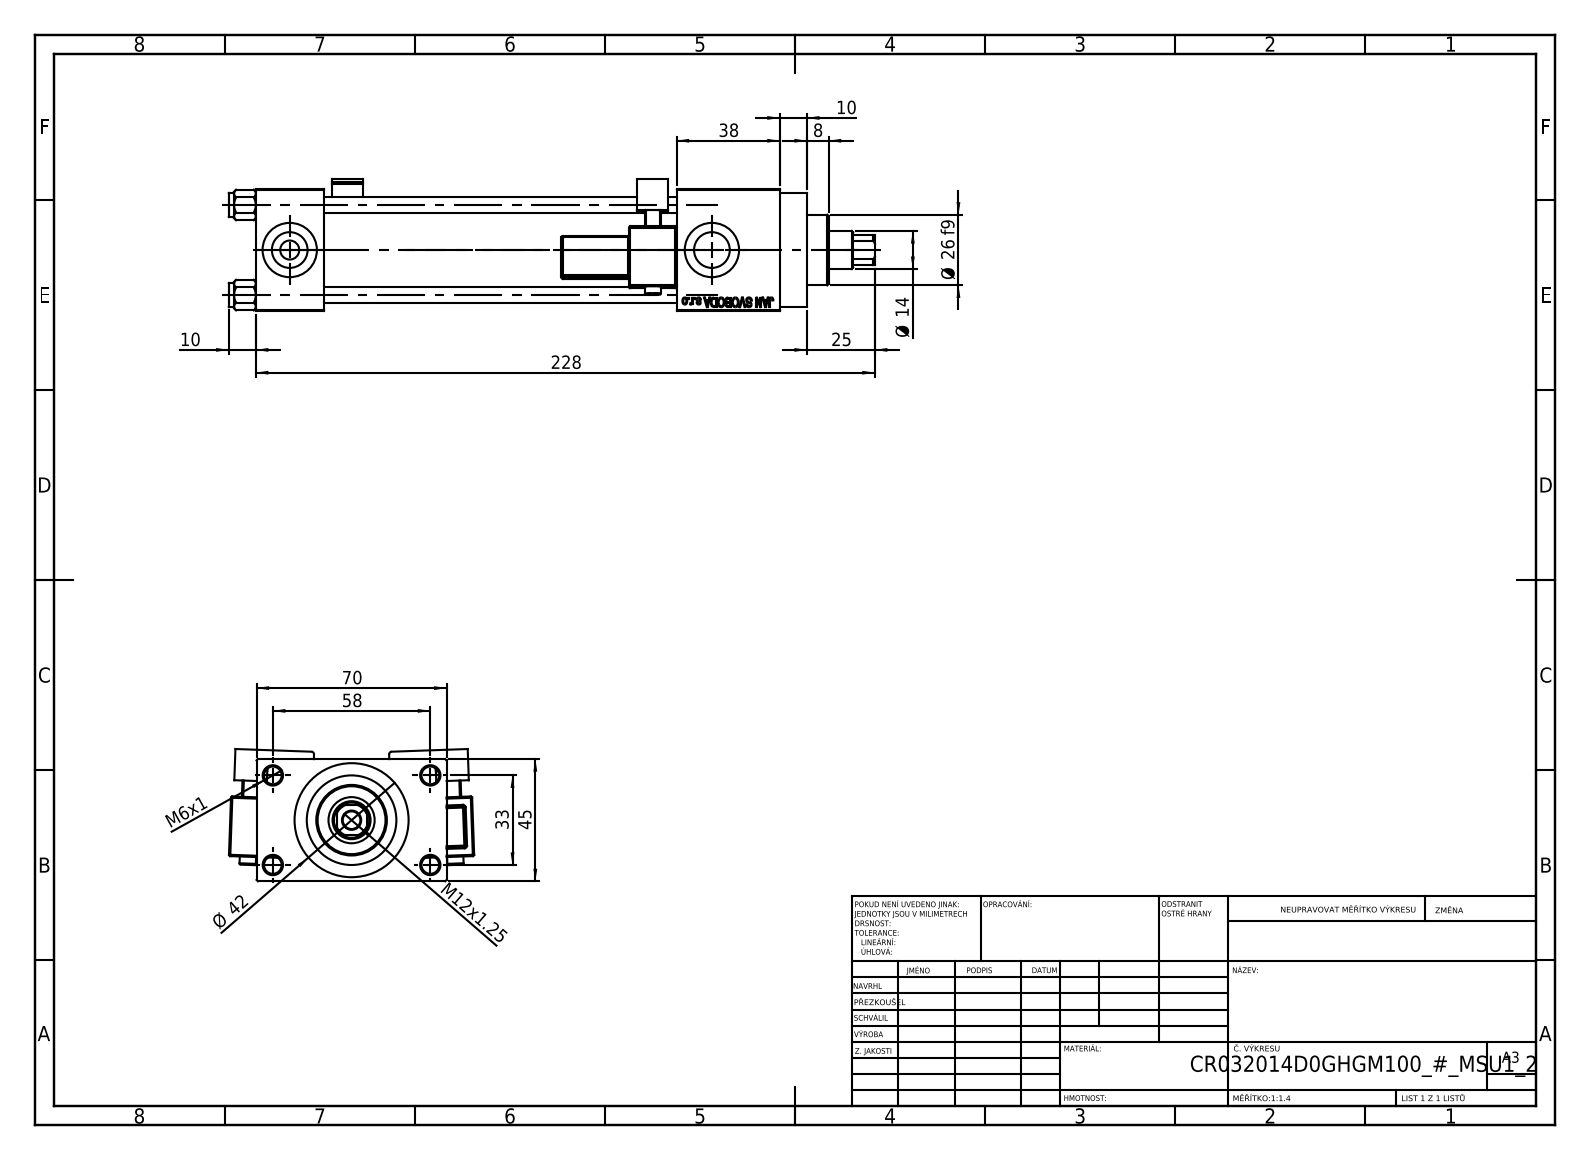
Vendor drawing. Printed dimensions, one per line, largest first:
228
70
58
45
Ø 42
38
33
Ø 26 f9
25
Ø 14
M12x1.25
10
10
8
M6x1
